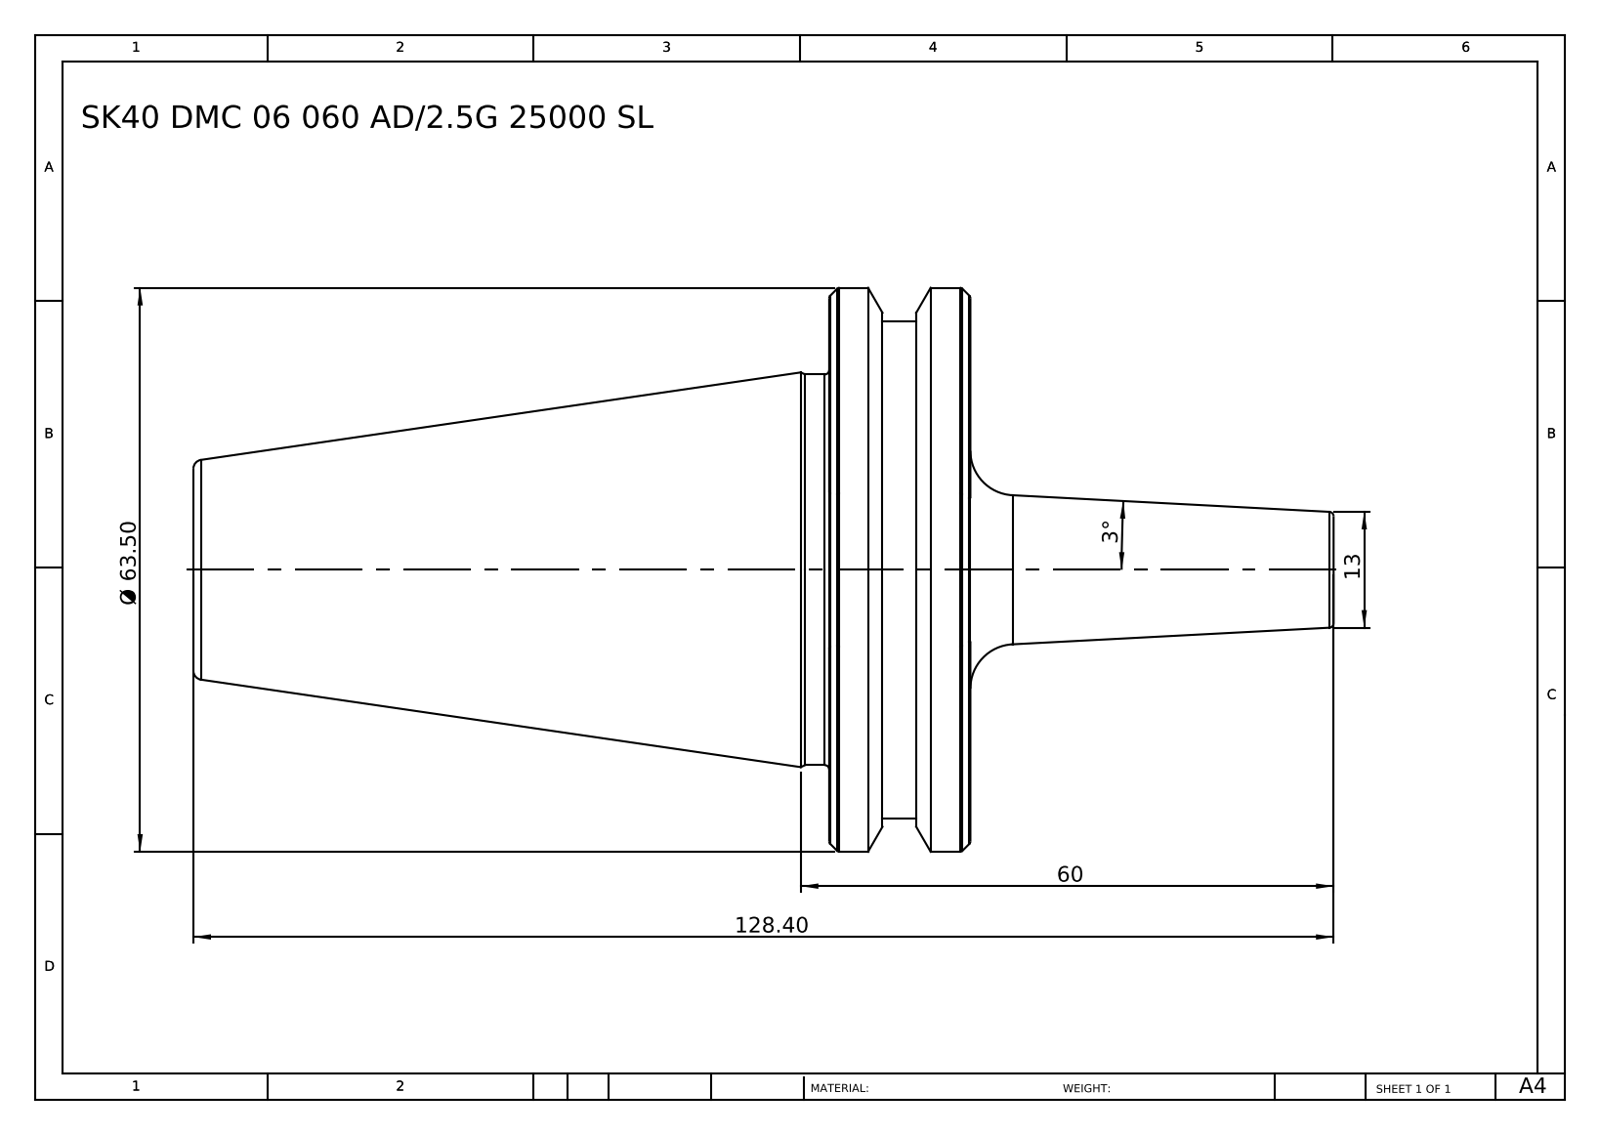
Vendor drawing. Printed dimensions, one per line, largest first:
128.40
Ø 63.50
60
13
3°
